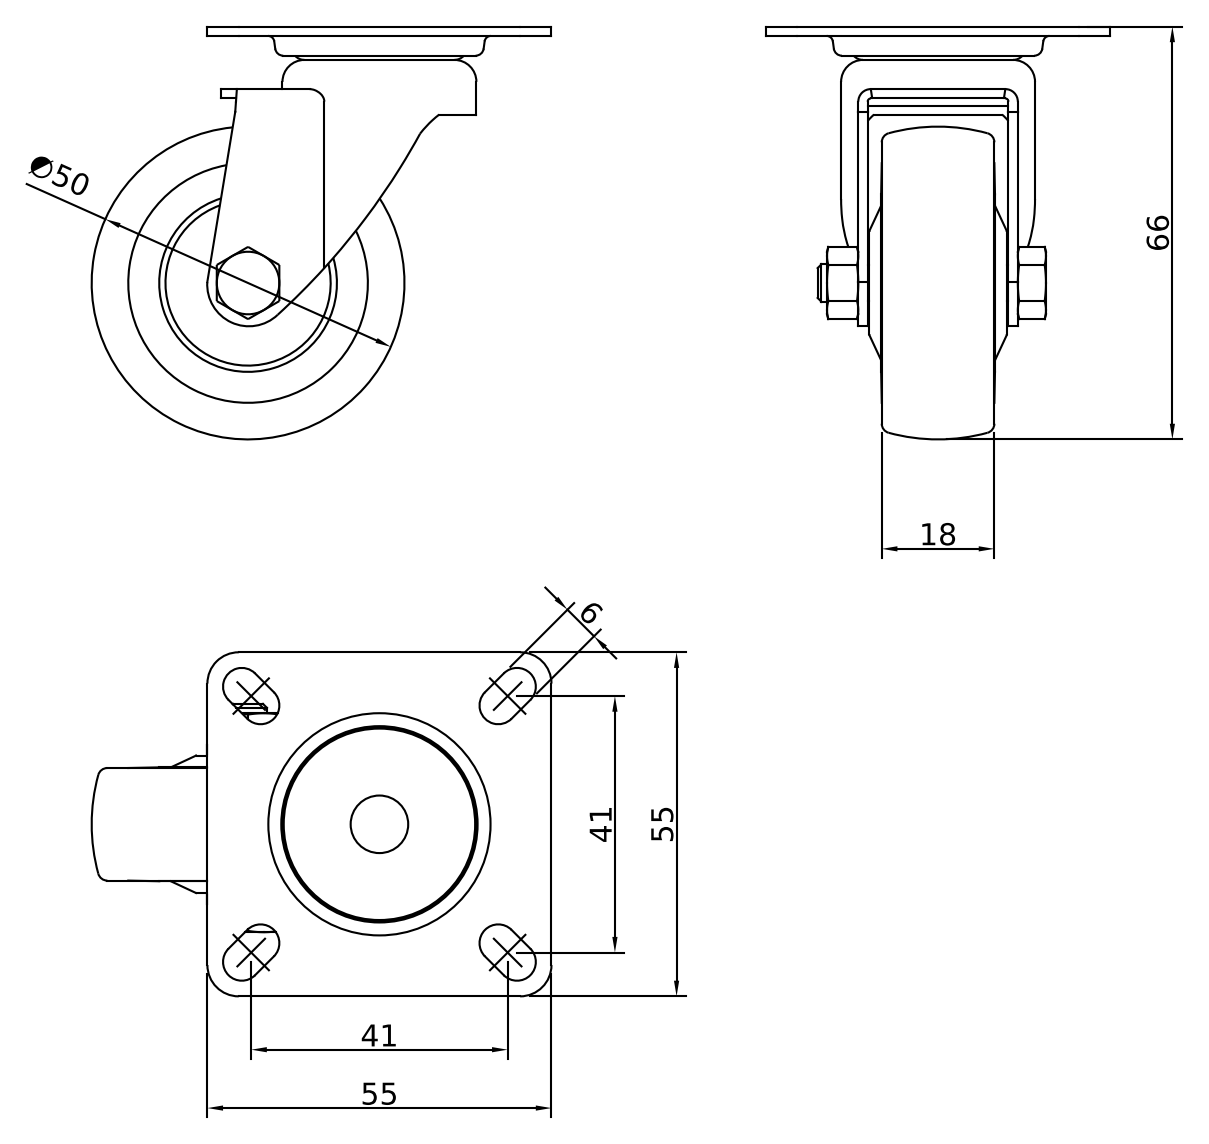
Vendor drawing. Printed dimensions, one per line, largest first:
66
55
55
∅50
41
41
18
6
